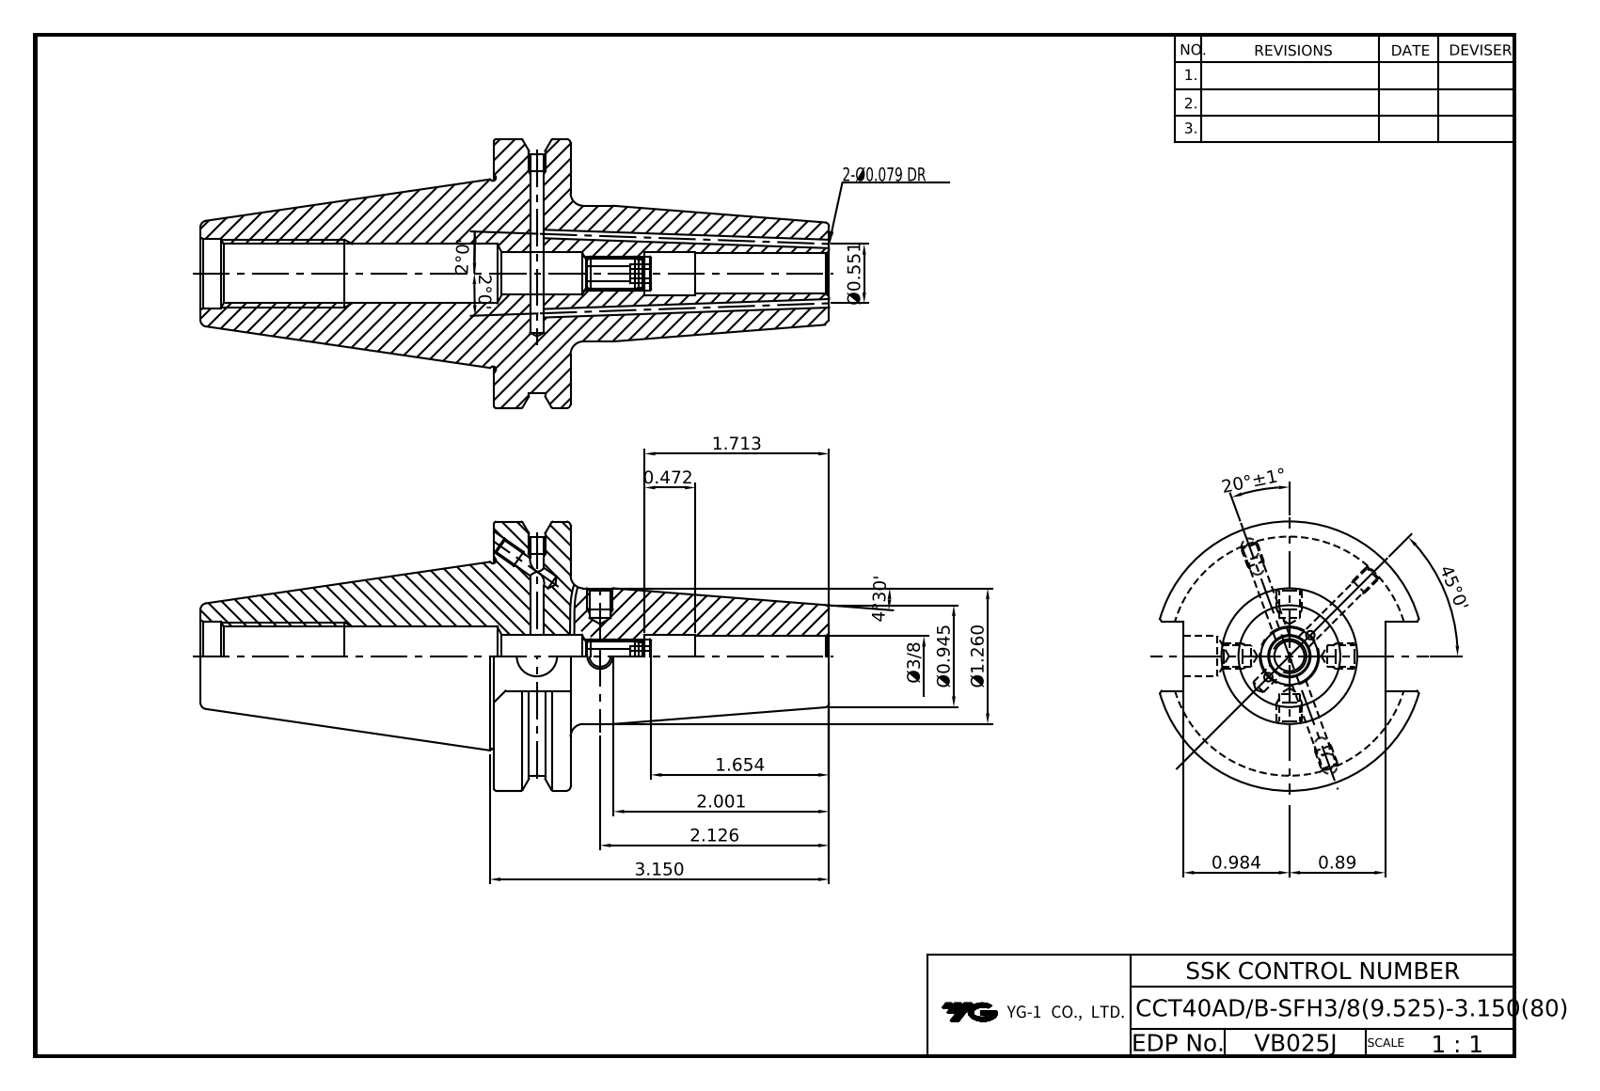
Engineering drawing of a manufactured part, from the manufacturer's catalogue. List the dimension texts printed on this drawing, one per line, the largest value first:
45°0'
20°±1°
4°30'
3.150
2.126
2.001
1.713
1.654
Ø1.260
0.984
Ø0.945
0.89
Ø0.551
0.472
